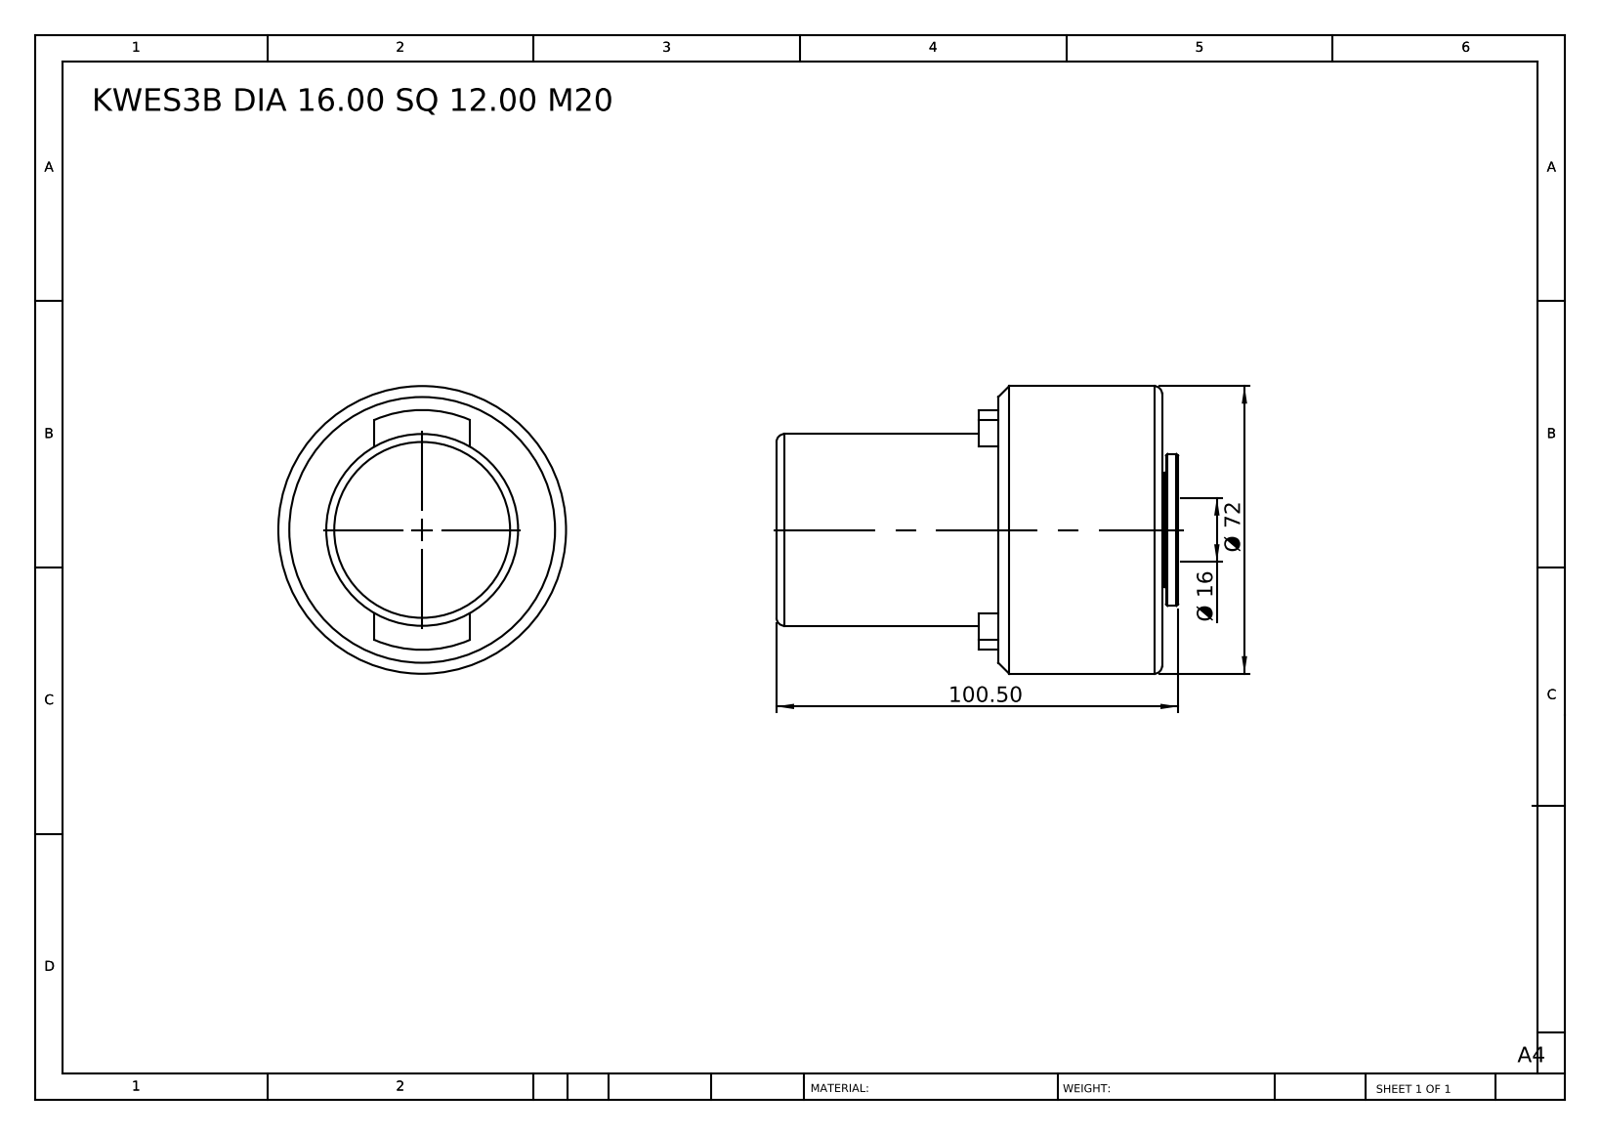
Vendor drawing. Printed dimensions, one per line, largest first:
100.50
Ø 72
Ø 16
